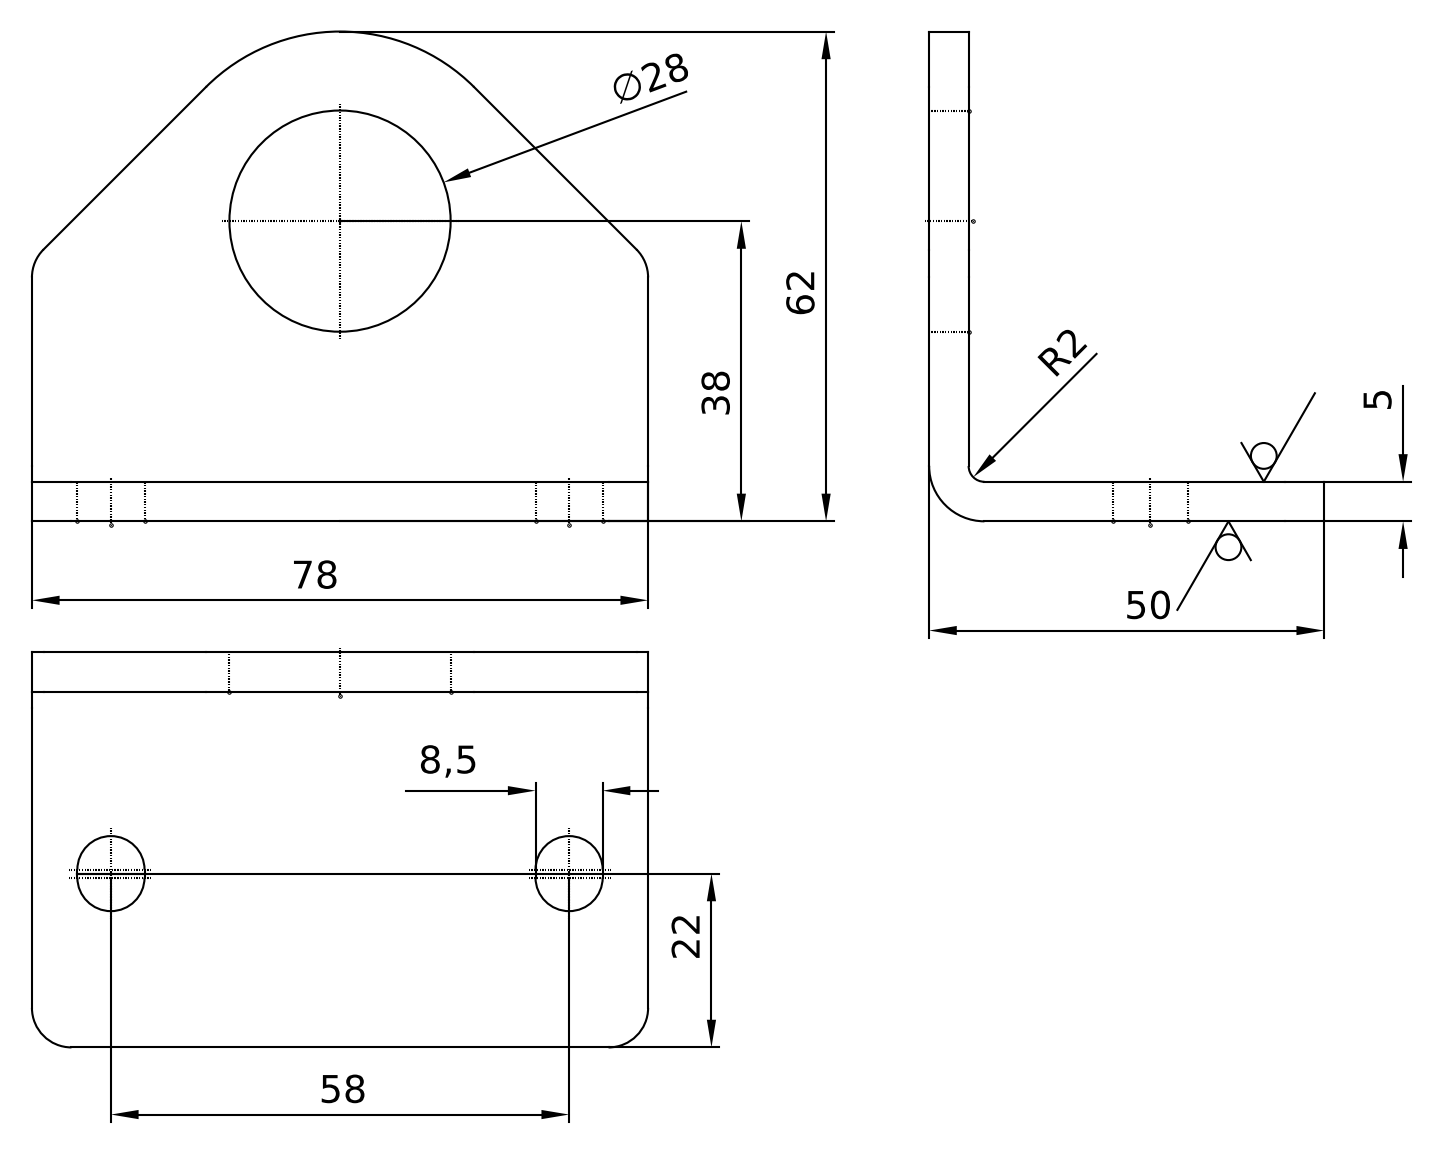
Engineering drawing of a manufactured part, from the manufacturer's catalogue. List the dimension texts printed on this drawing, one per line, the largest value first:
78
62
58
50
38
∅28
22
8,5
5
R2
